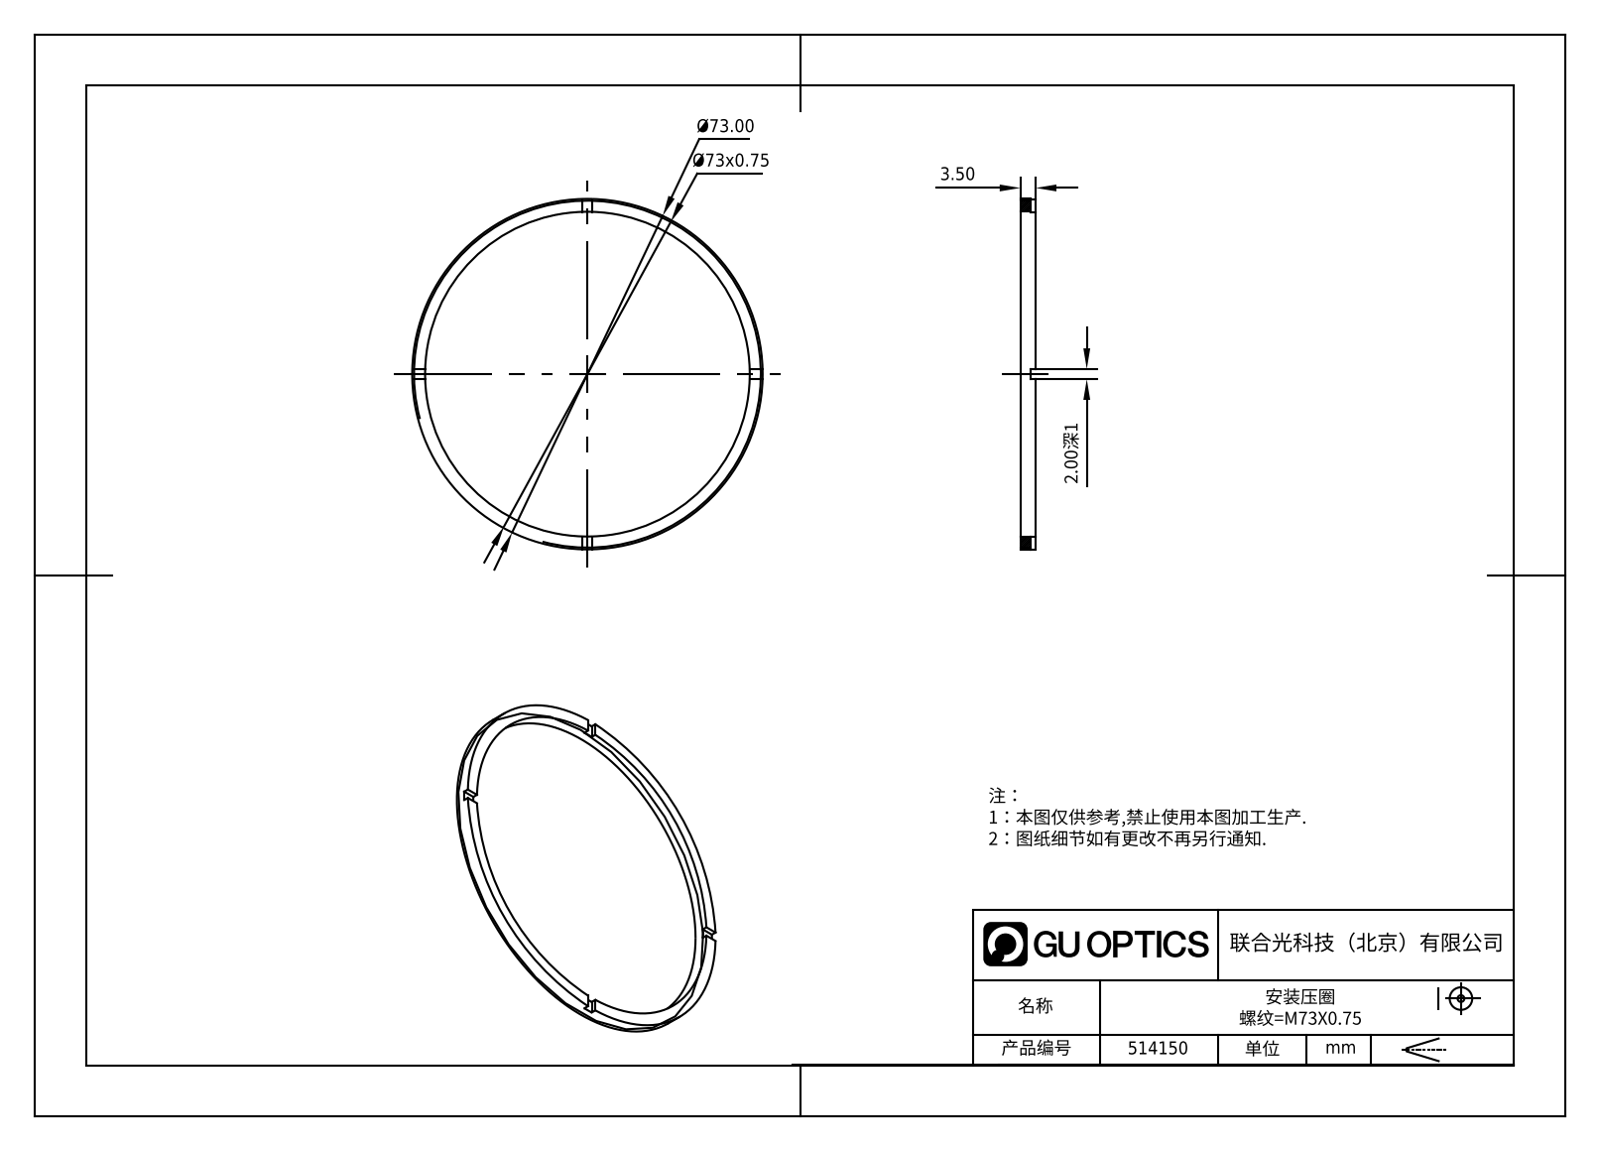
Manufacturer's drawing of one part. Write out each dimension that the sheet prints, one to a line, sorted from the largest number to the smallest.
Ø73.00
Ø73x0.75
3.50
2.00深1
